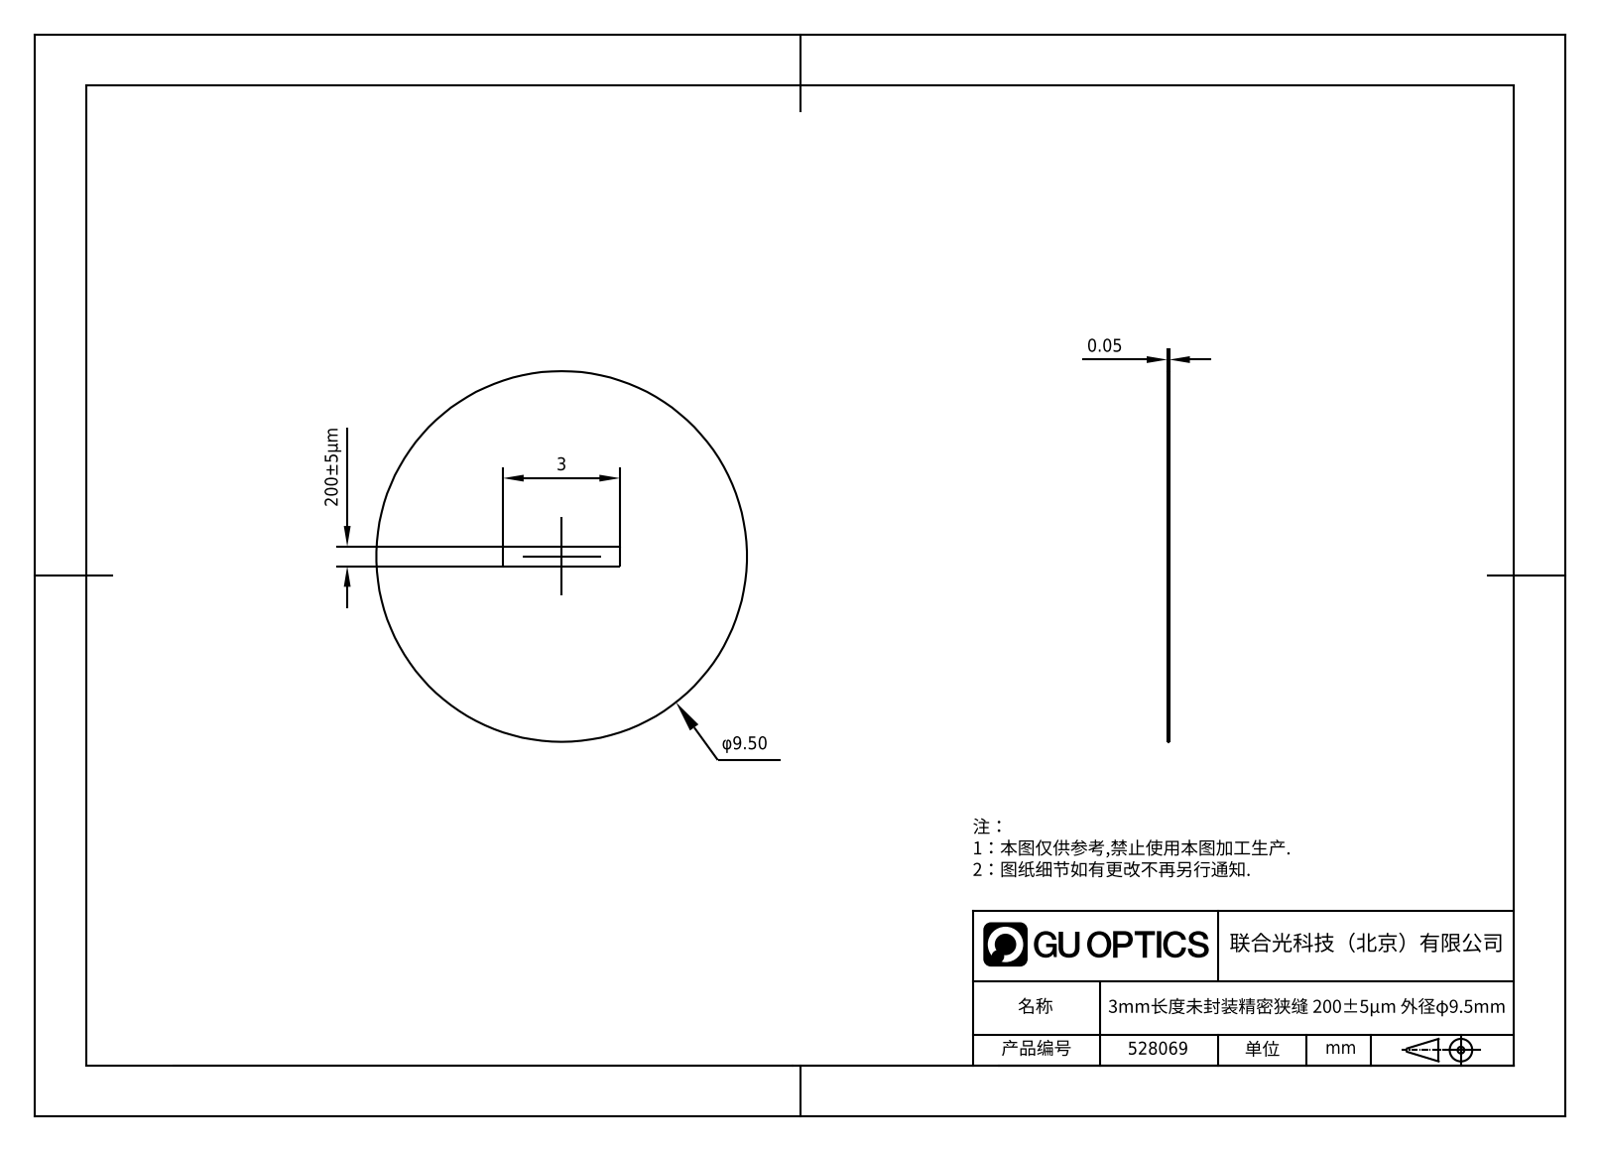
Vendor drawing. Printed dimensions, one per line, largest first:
200±5μm
3
0.05
